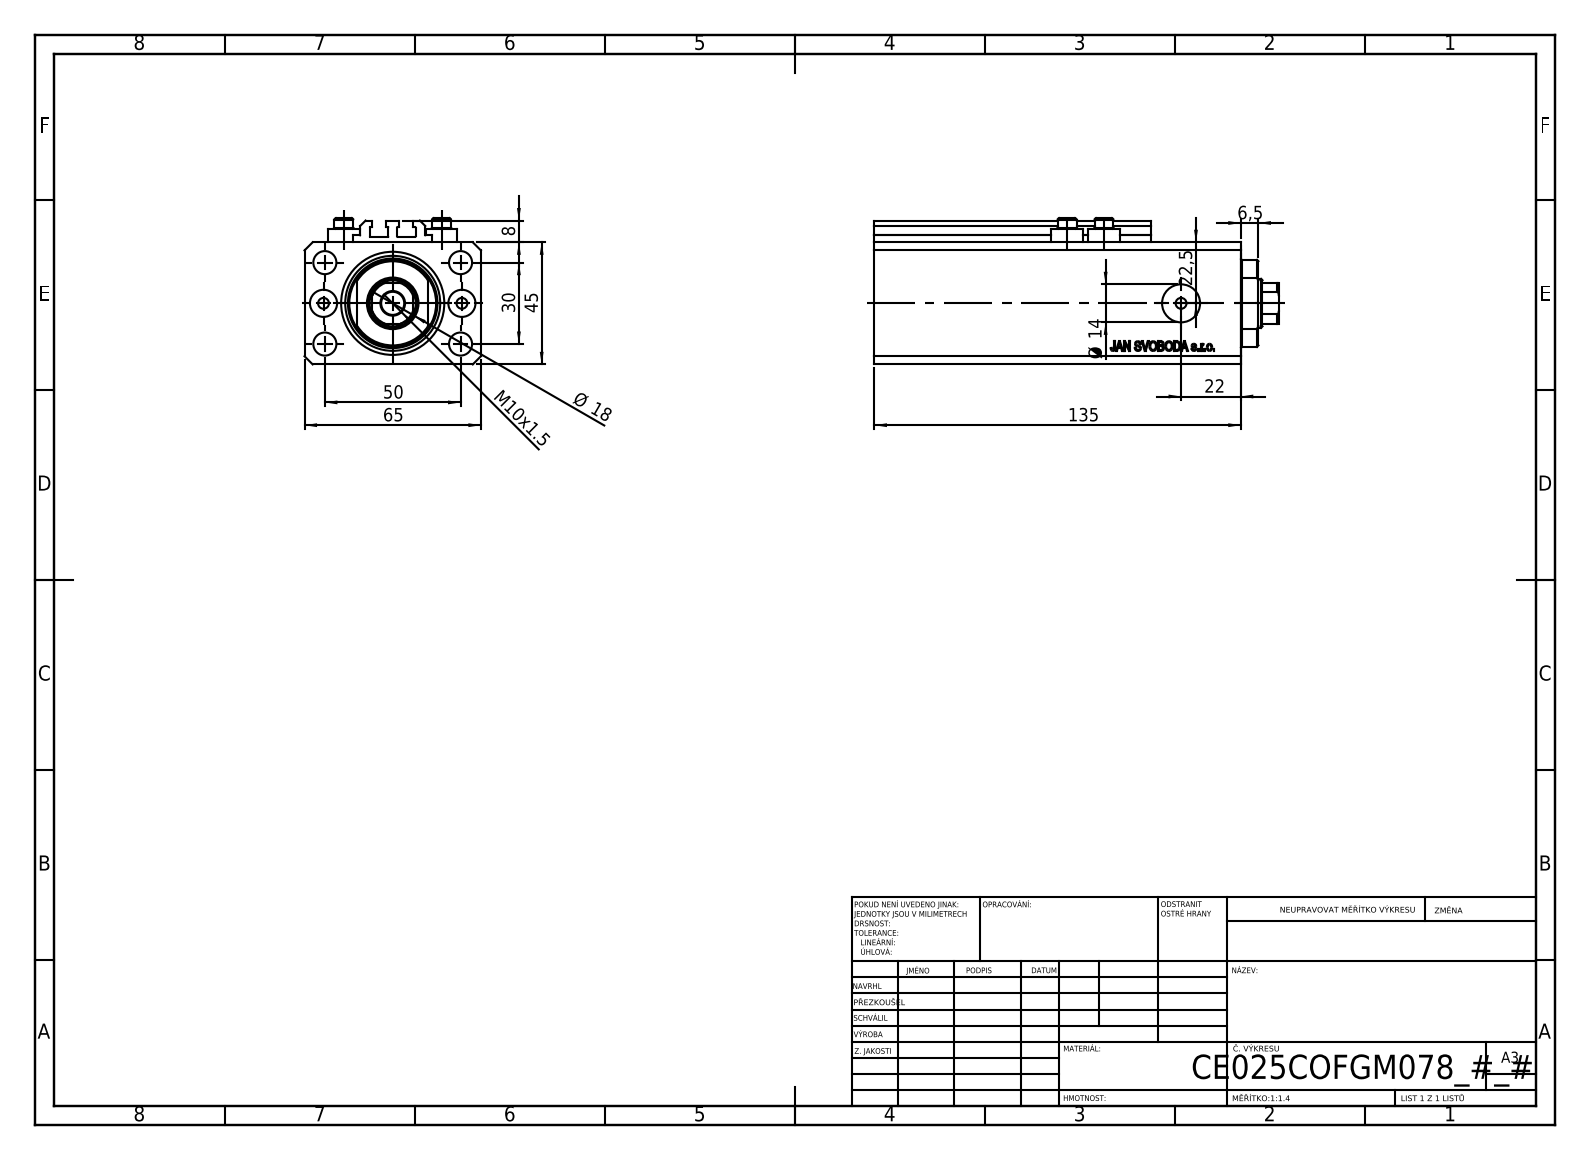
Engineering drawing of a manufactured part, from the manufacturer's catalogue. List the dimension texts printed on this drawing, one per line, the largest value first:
135
65
50
45
30
22,5
22
Ø 18
Ø 14
M10x1.5
8
6,5
